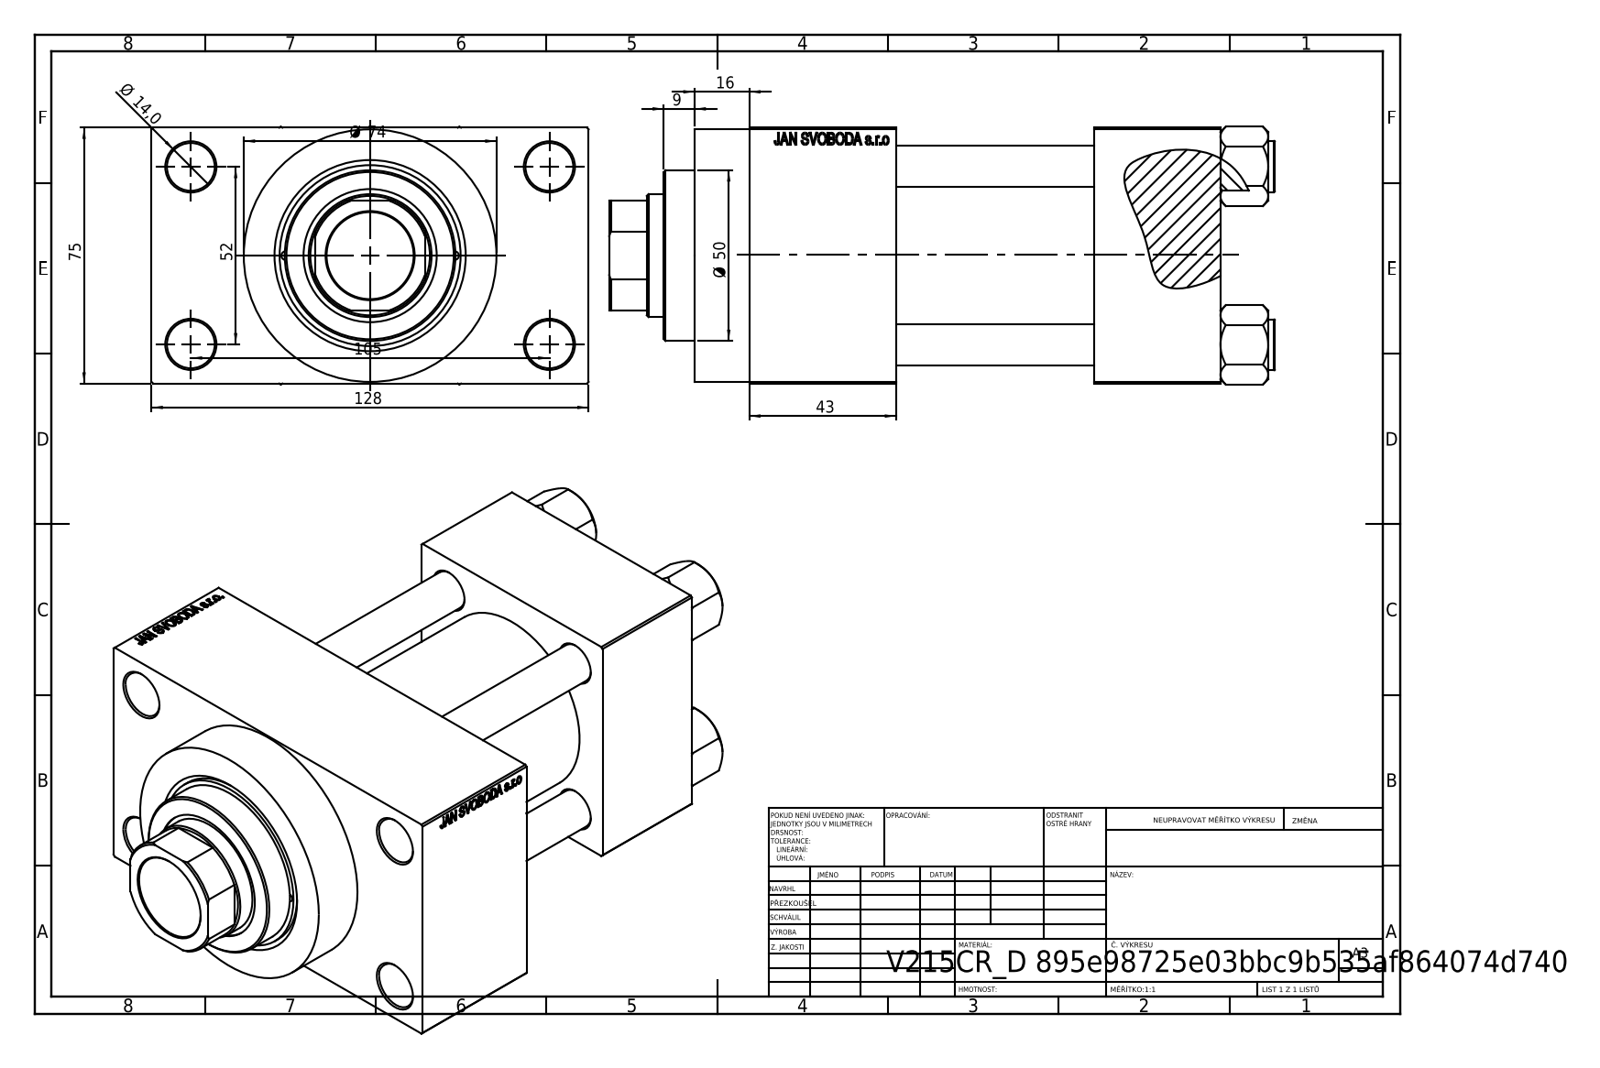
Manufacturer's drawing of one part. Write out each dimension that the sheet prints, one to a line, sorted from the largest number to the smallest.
128
105
75
Ø 74
52
Ø 50
43
16
Ø 14,0
9
